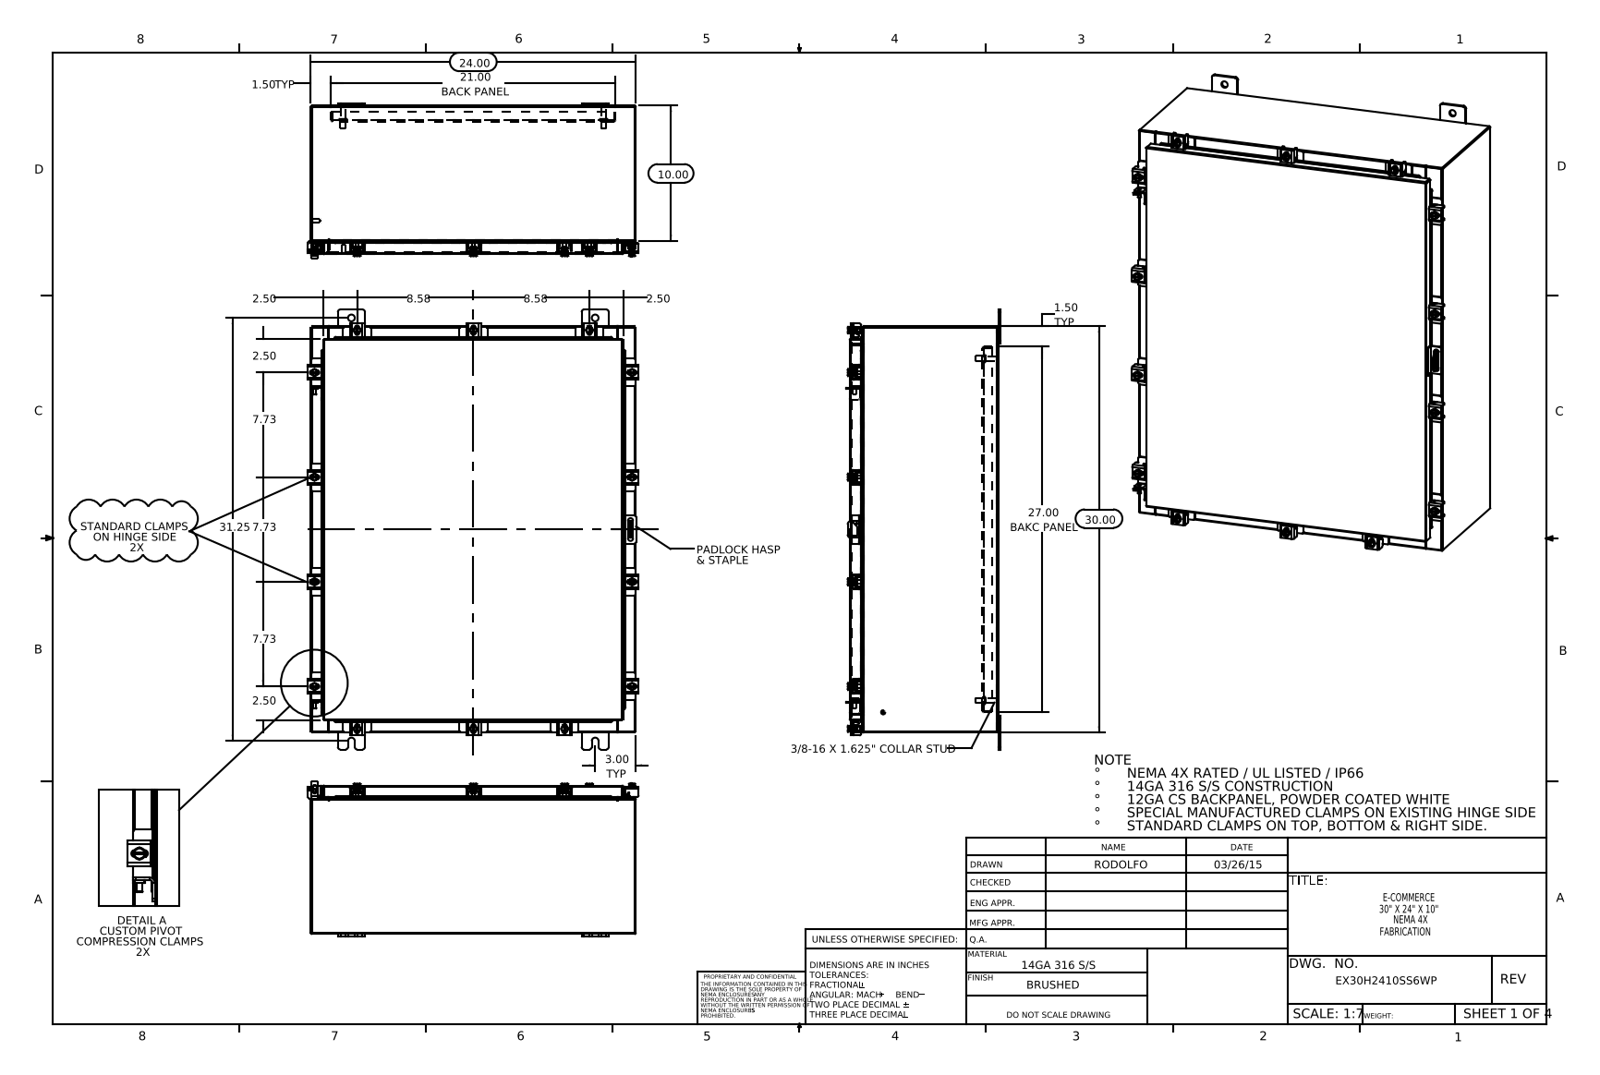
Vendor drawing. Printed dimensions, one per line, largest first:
31.25
30.00
27.00 BAKC PANEL
24.00
21.00 BACK PANEL
10.00
8.58
8.58
7.73
7.73
7.73
3.00 TYP
2.50
2.50
2.50
2.50
1.50 TYP
1.50 TYP
